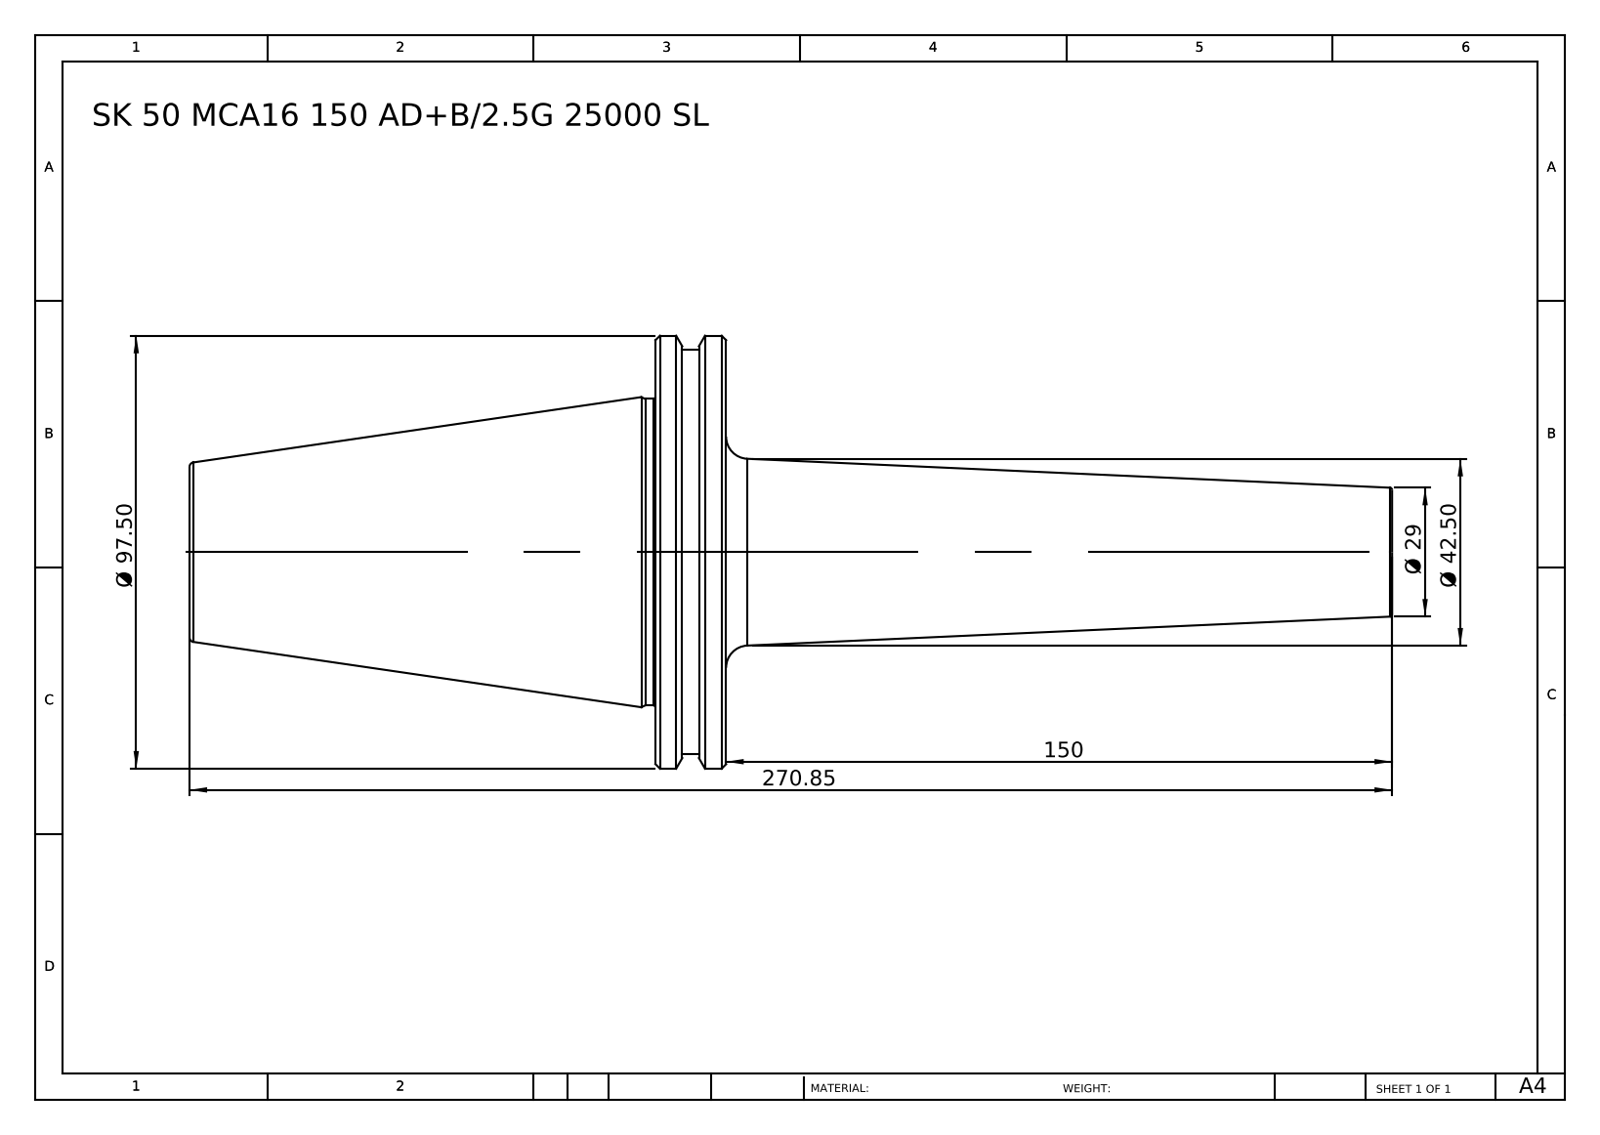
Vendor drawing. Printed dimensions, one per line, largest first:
270.85
150
Ø 97.50
Ø 42.50
Ø 29
